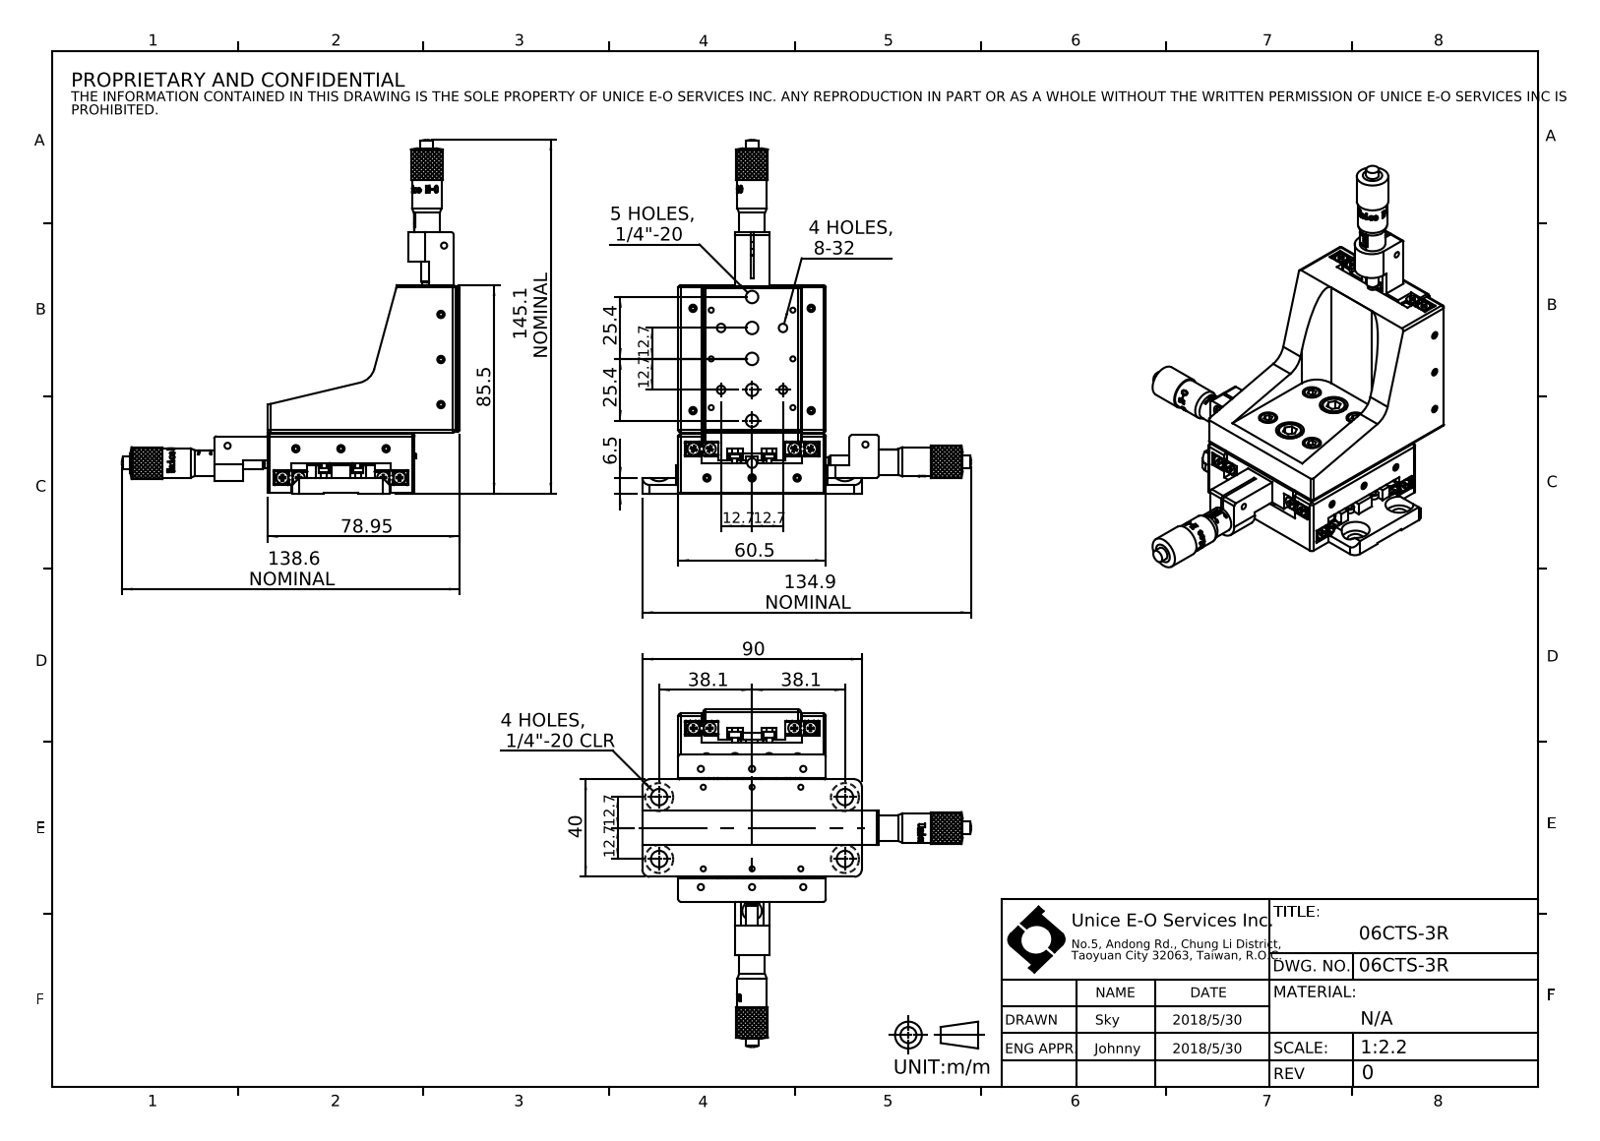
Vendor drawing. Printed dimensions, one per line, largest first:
145.1 NOMINAL
138.6 NOMINAL
134.9 NOMINAL
90
85.5
78.95
60.5
40
38.1
38.1
25.4
25.4
12.7
12.7
12.7
12.7
12.7
12.7
6.5
5 HOLES, 1/4"-20
4 HOLES, 1/4"-20 CLR
4 HOLES, 8-32
